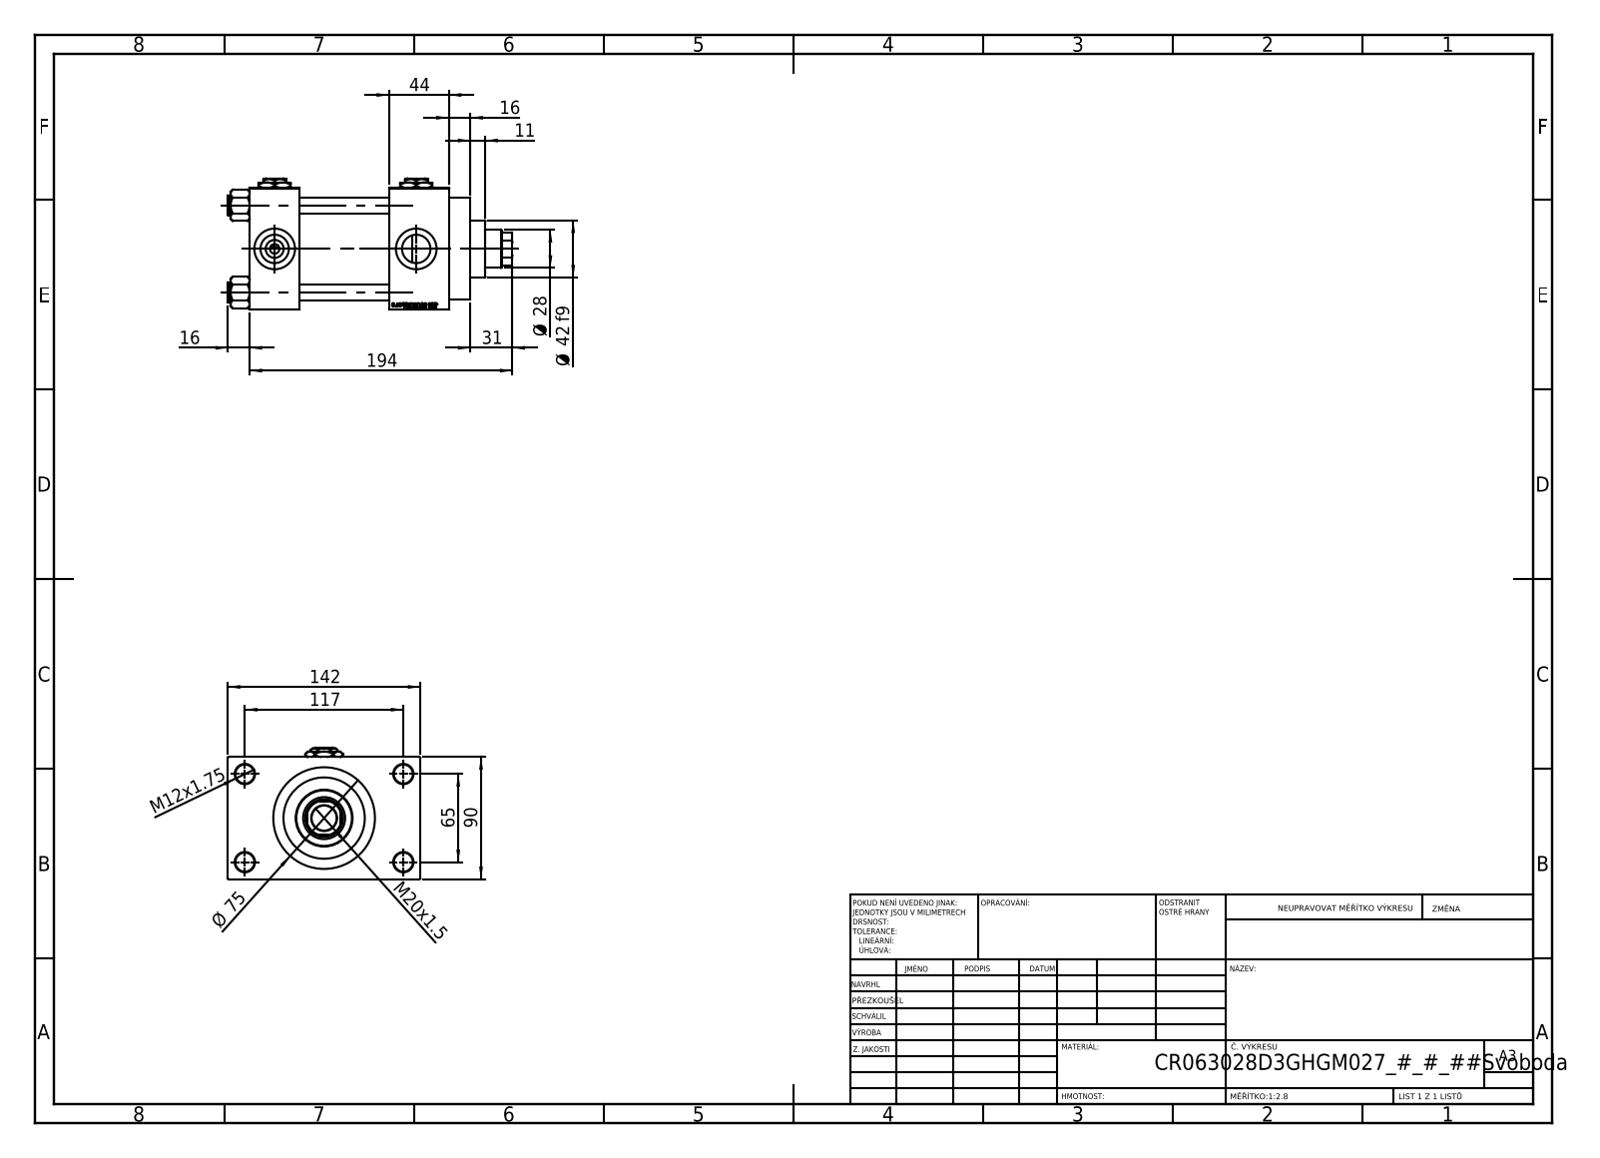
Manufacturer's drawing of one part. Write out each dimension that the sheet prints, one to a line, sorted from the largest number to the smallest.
194
142
117
90
Ø 75
65
44
Ø 42 f9
31
Ø 28
M20x1.5
16
16
M12x1.75
11
